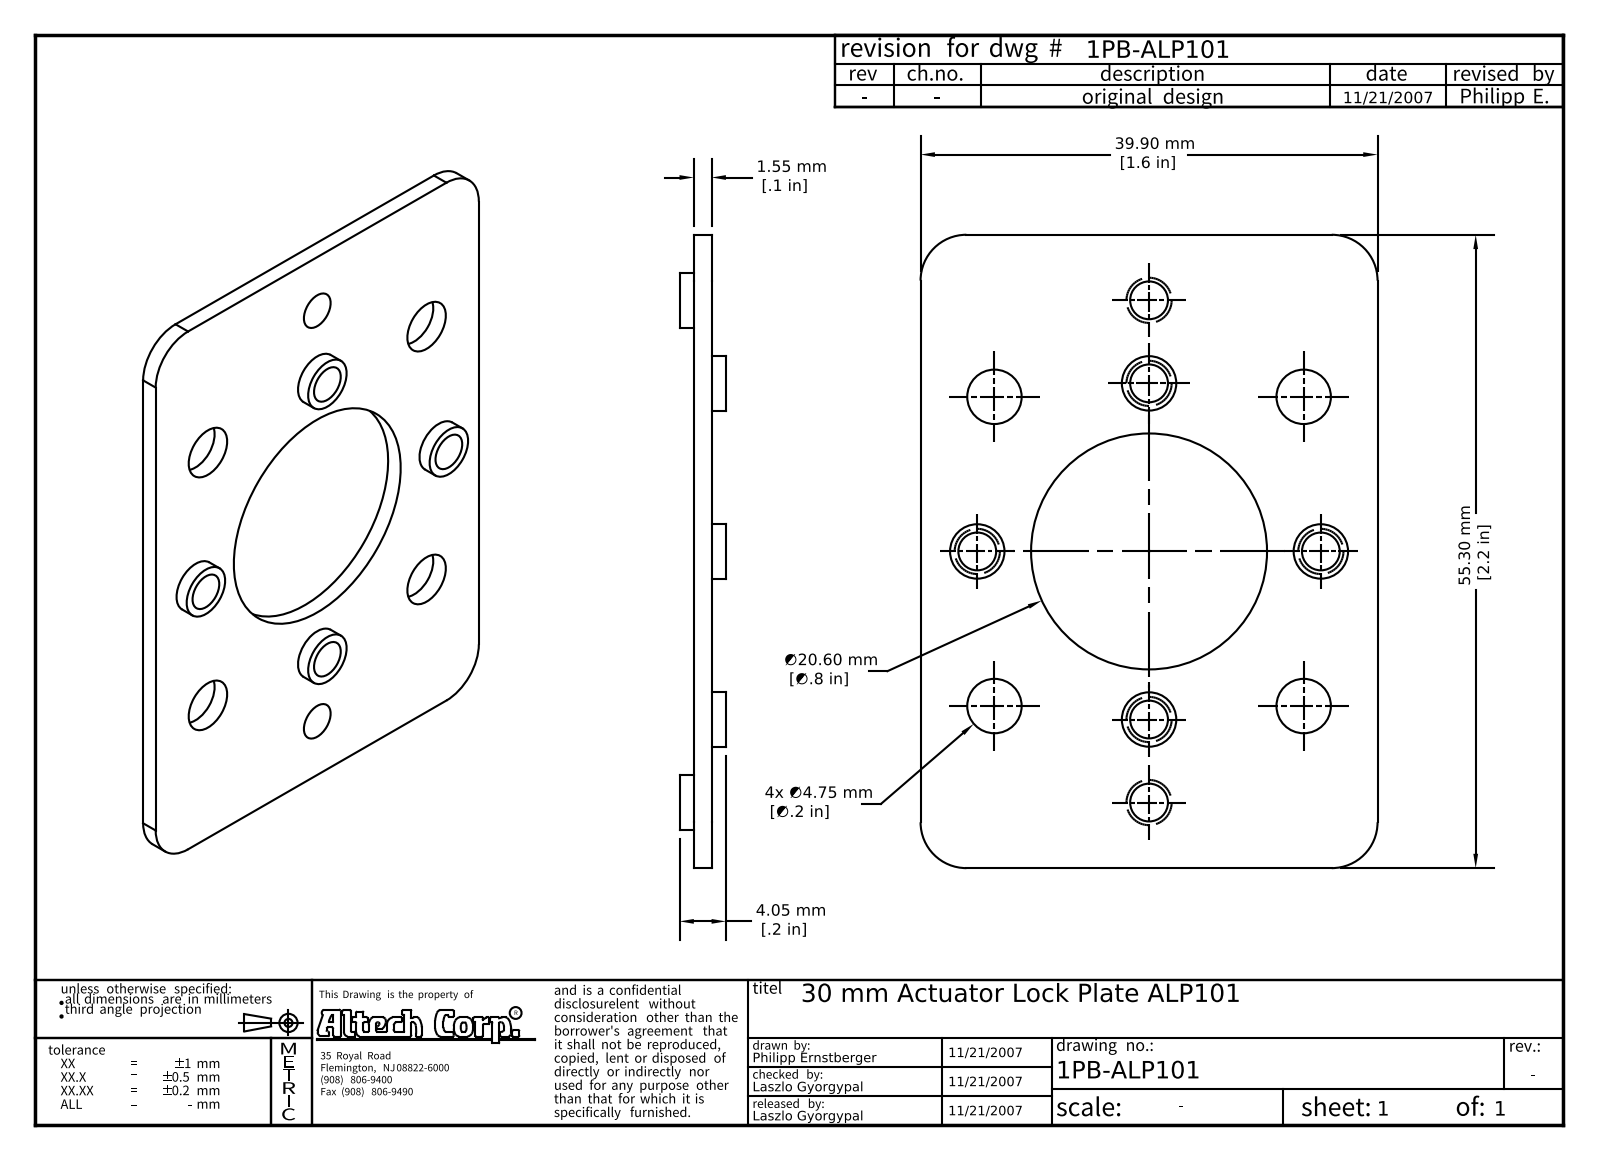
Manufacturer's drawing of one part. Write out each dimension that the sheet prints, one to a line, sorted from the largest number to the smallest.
55.30 mm [2.2 in]
39.90 mm [1.6 in]
∅20.60 mm [∅.8 in]
4x ∅4.75 mm [∅.2 in]
4.05 mm [.2 in]
1.55 mm [.1 in]
